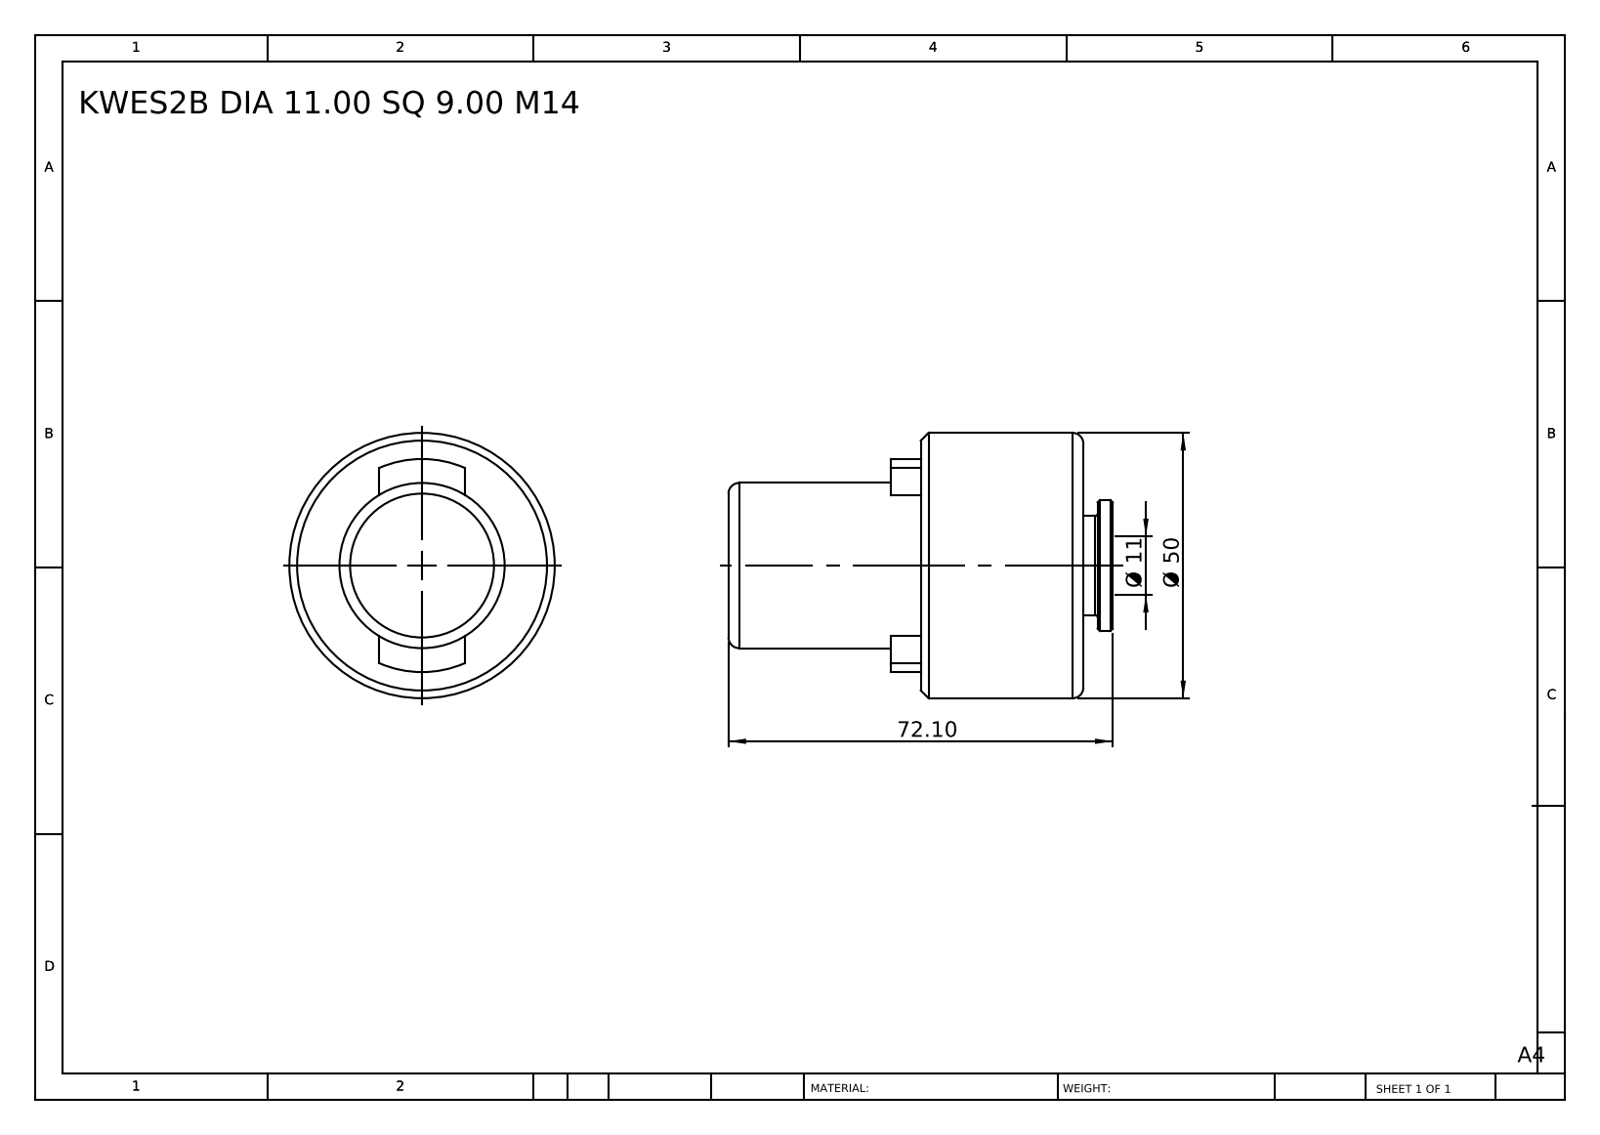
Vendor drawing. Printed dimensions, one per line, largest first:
72.10
Ø 50
Ø 11
